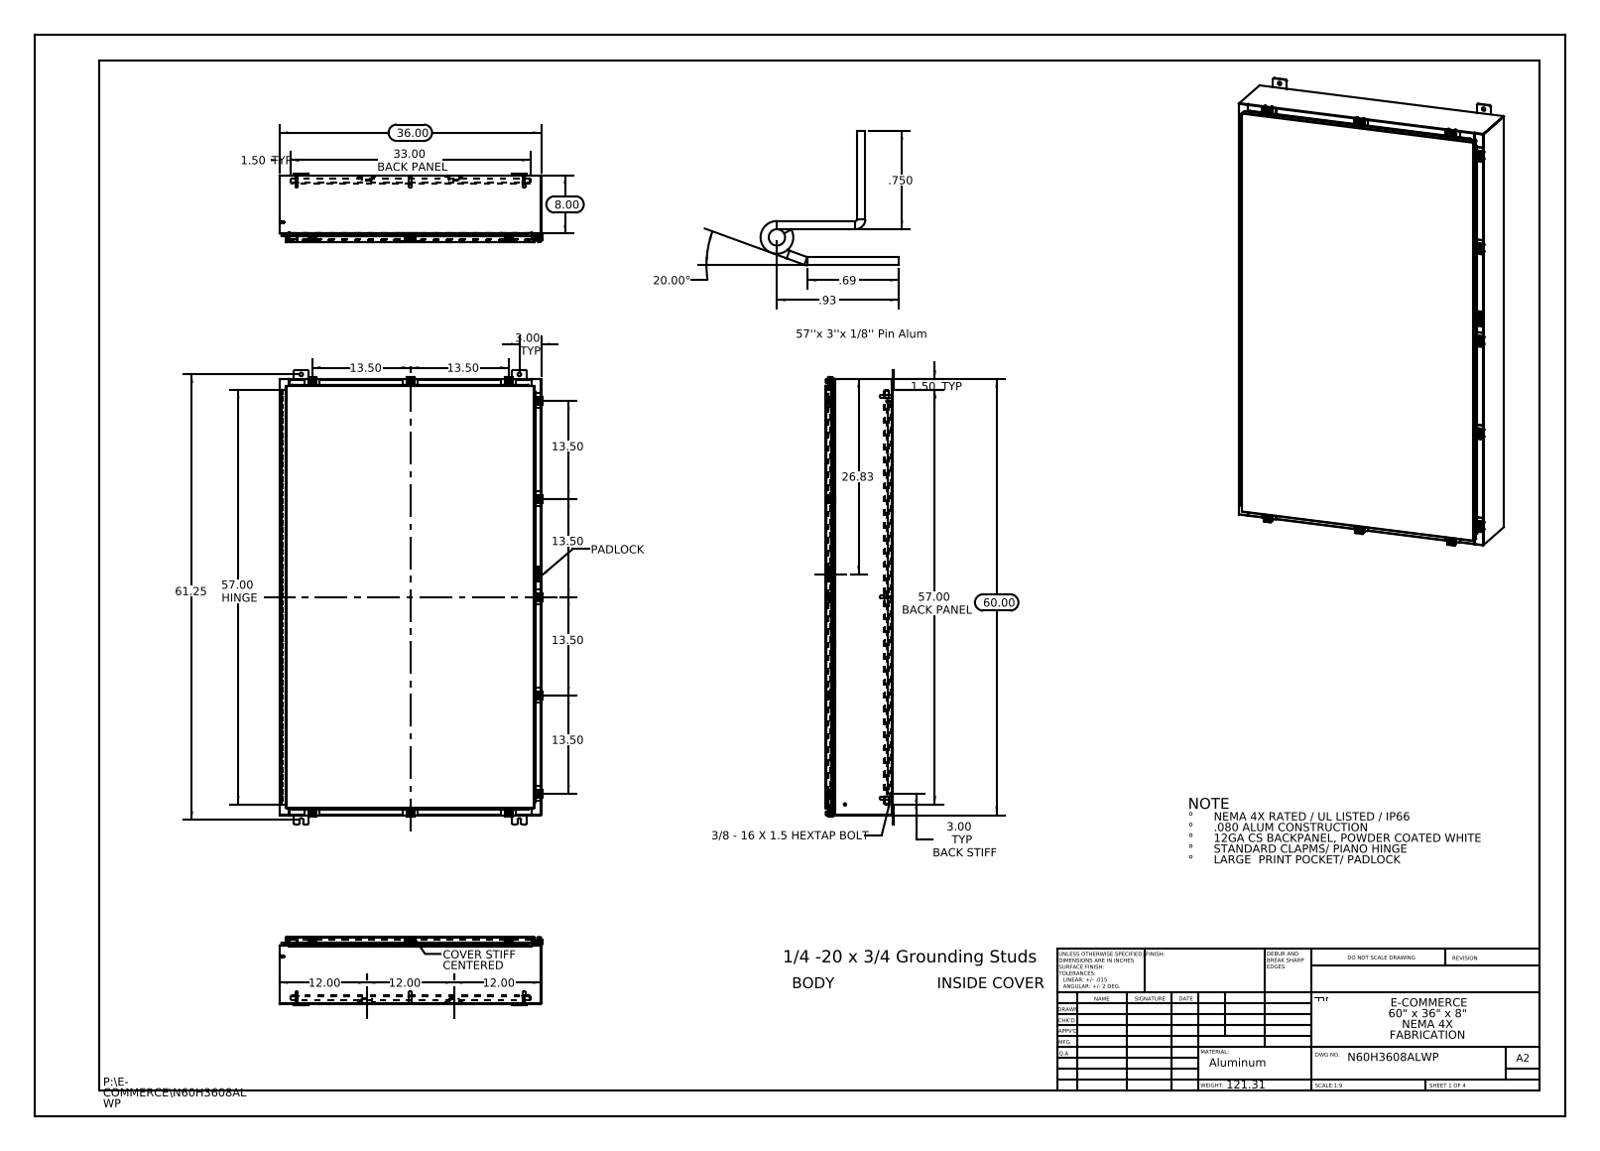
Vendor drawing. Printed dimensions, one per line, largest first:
61.25
60.00
57.00 HINGE
57.00 BACK PANEL
36.00
33.00 BACK PANEL
26.83
20.00°
13.50
13.50
13.50
13.50
13.50
13.50
12.00
12.00
12.00
8.00
3.00 TYP
3.00 TYP BACK STIFF
1.50 TYP
1.50 TYP
.93
.750
.69
